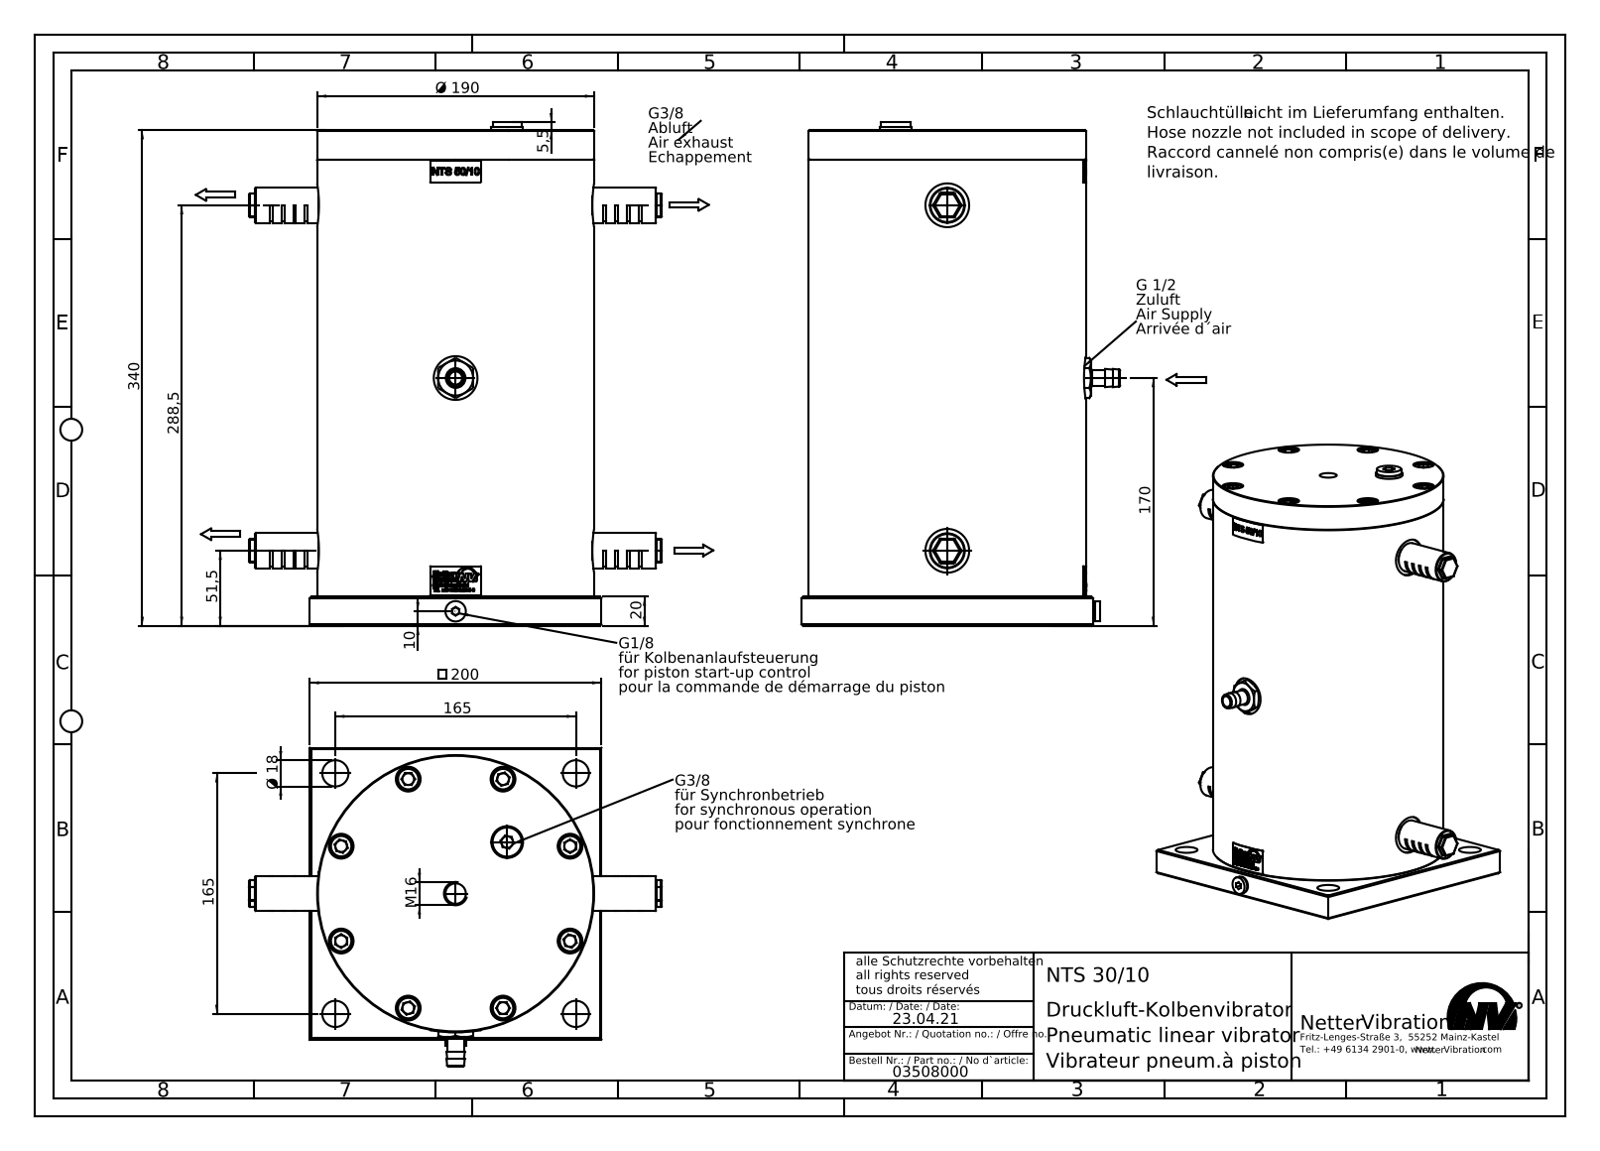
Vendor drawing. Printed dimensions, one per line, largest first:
340
288,5
200
Ø 190
170
165
165
51,5
20
Ø 18
M 16
10
5,5
